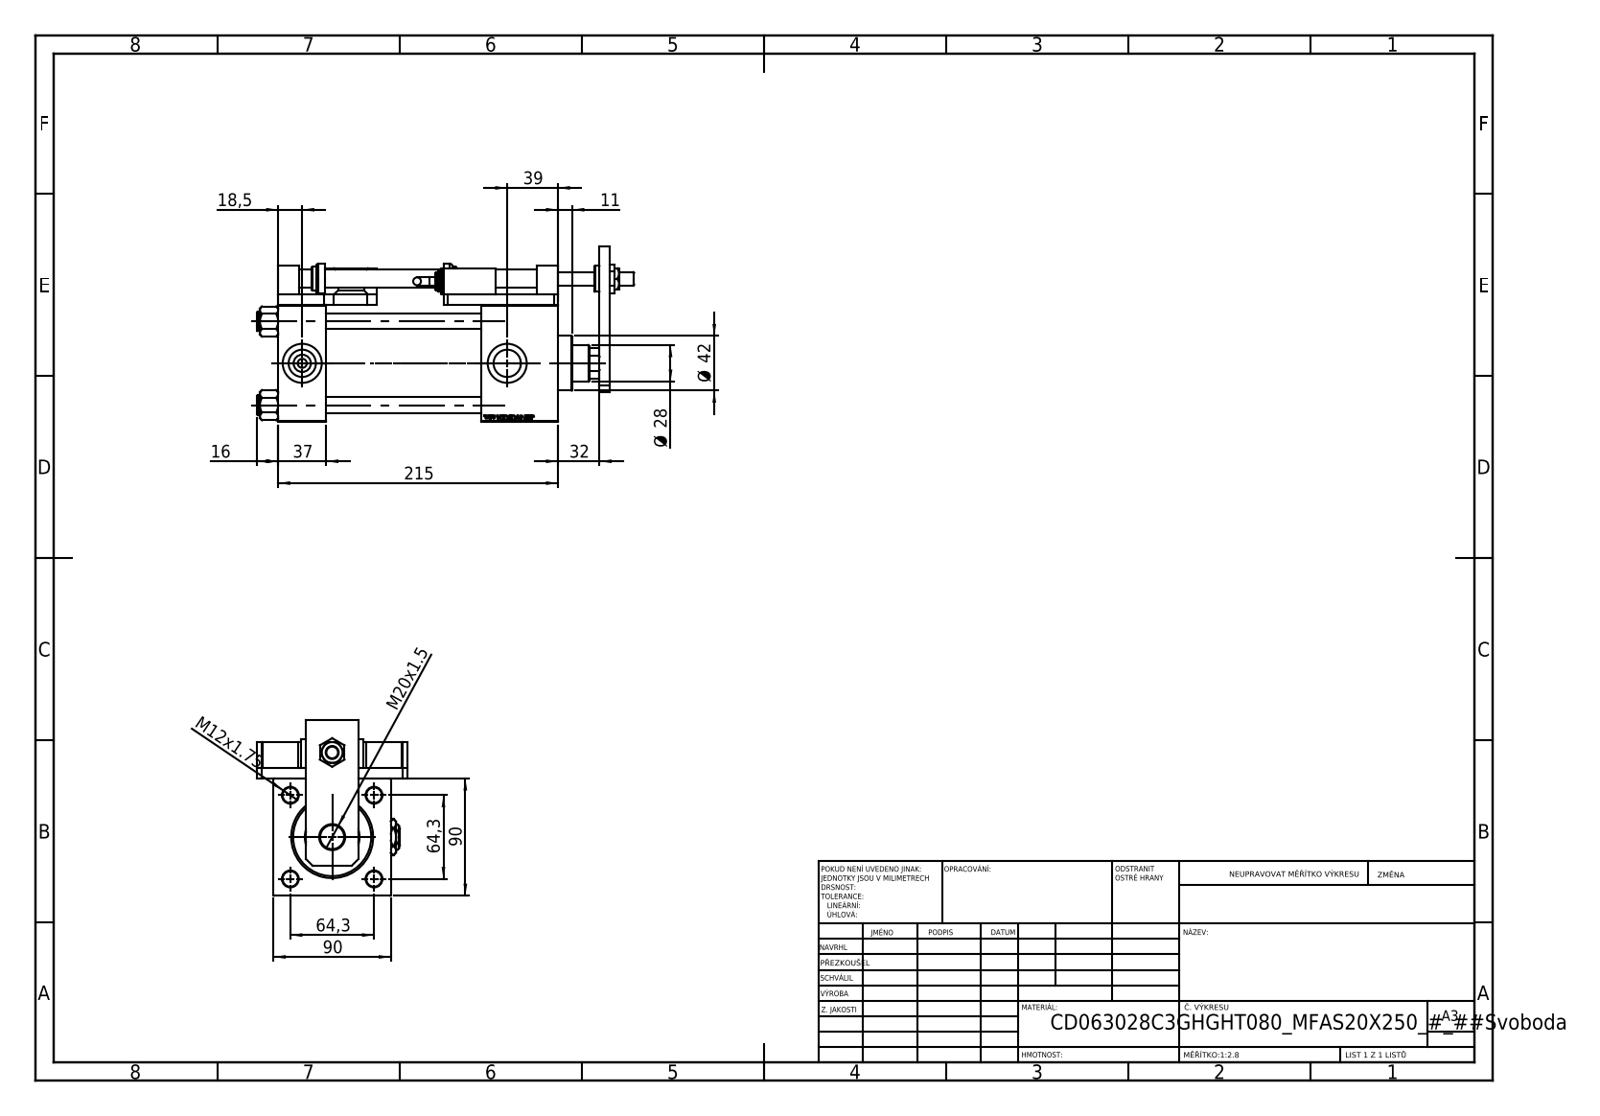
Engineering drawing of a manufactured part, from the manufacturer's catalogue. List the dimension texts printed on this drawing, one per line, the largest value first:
215
90
90
64,3
64,3
Ø 42
39
37
32
Ø 28
M20x1.5
18,5
16
M12x1.75
11
